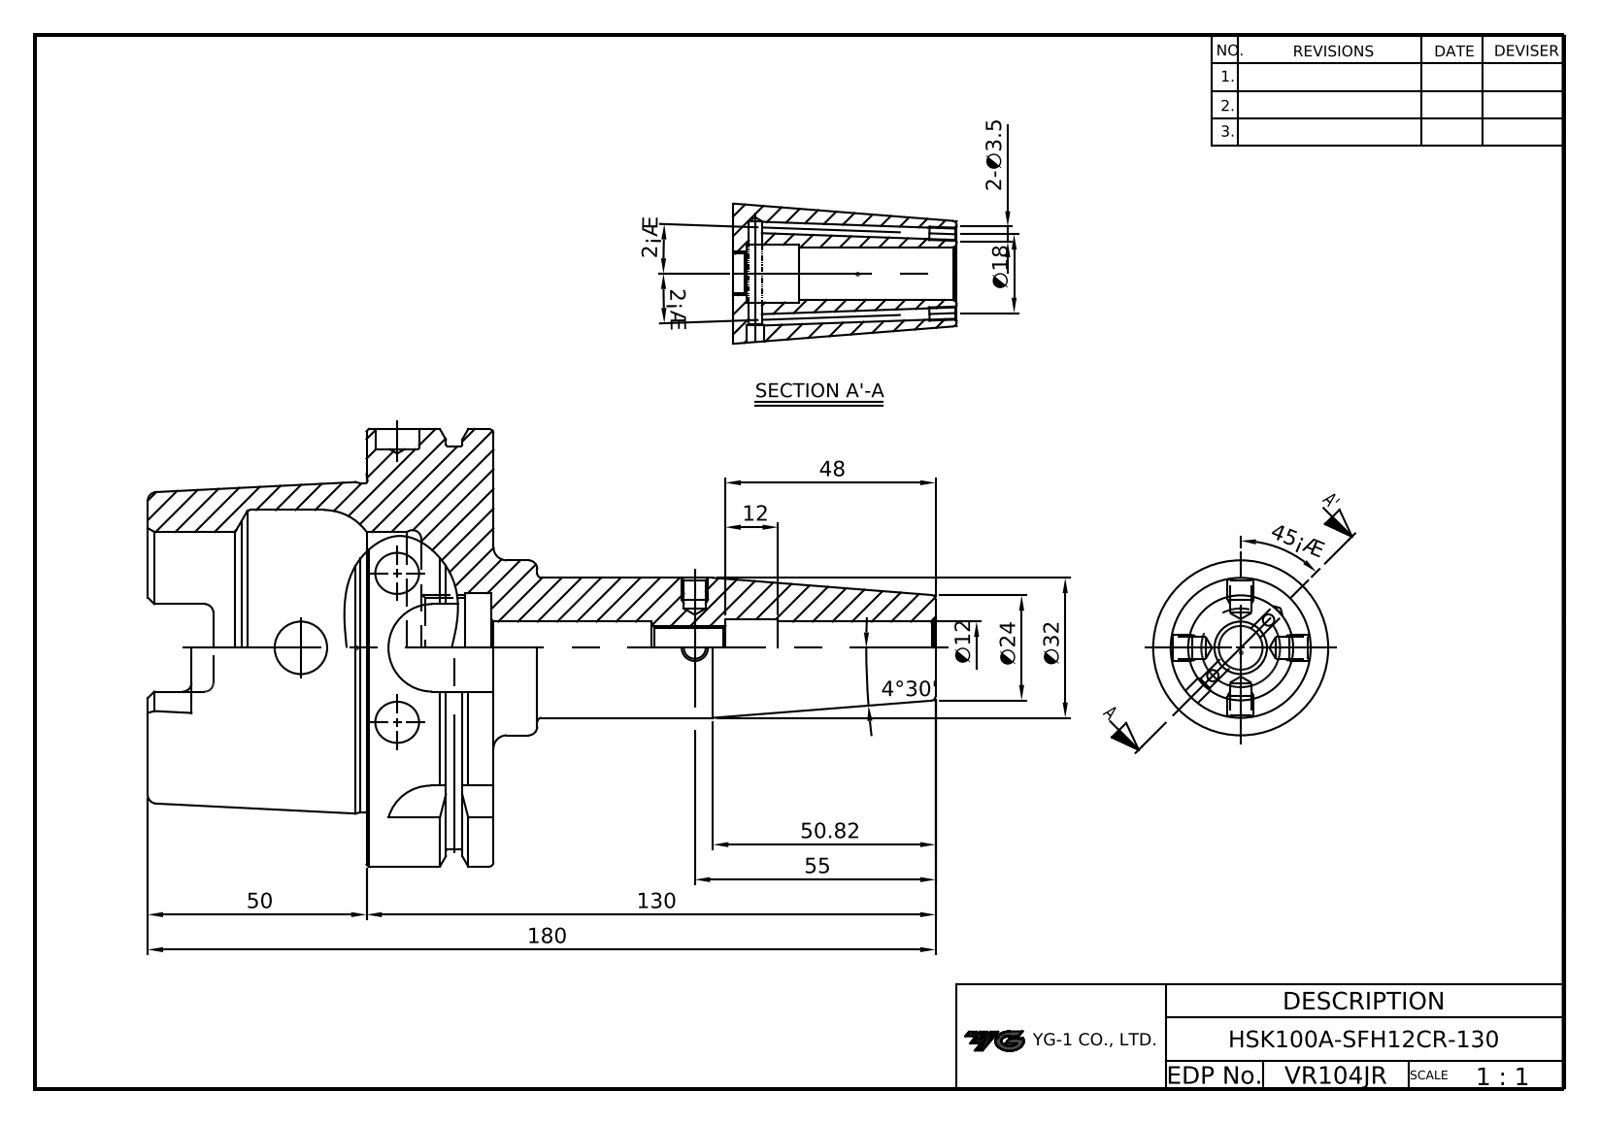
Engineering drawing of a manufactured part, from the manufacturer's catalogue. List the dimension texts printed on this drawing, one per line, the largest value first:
358.00
358.00
180.00
130.00
55.00
50.82
50.00
48.00
45.00
32.00
24.00
18.00
12.00
12.00
4°30'
3.50
